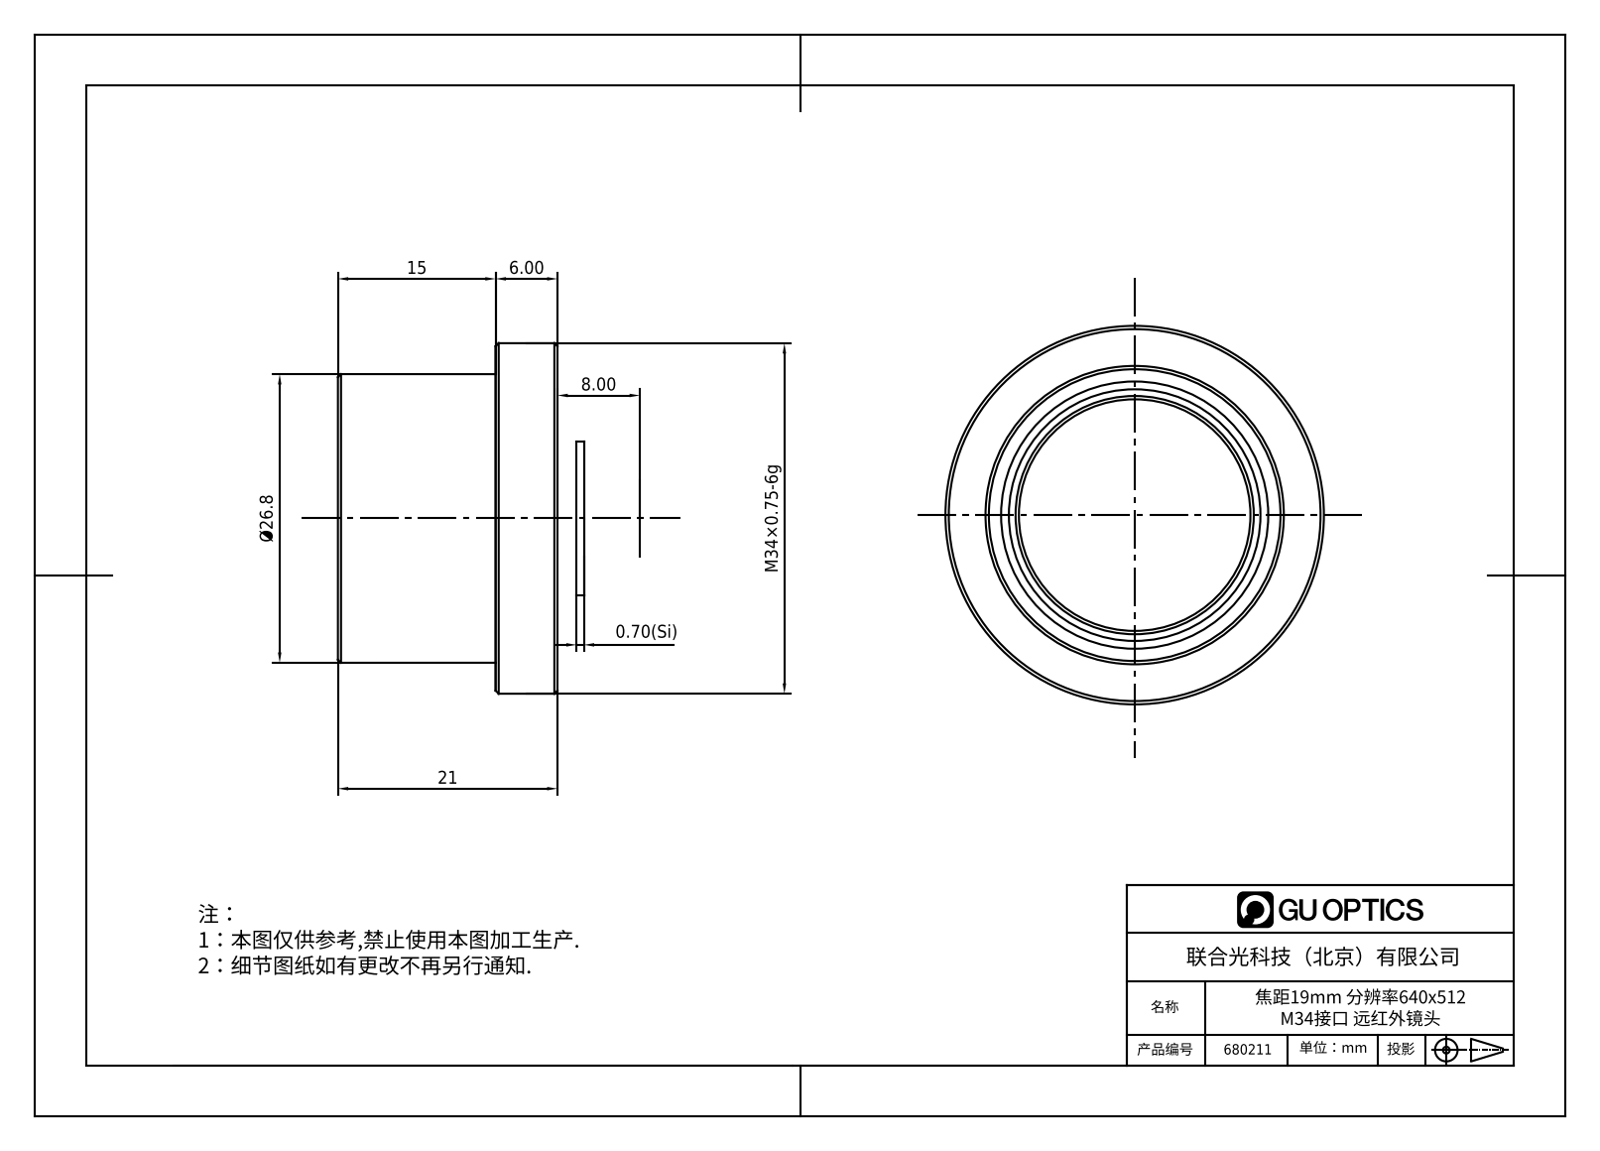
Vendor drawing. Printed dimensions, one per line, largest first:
M34×0.75-6g
Ø26.8
21
15
8.00
6.00
0.70(Si)
